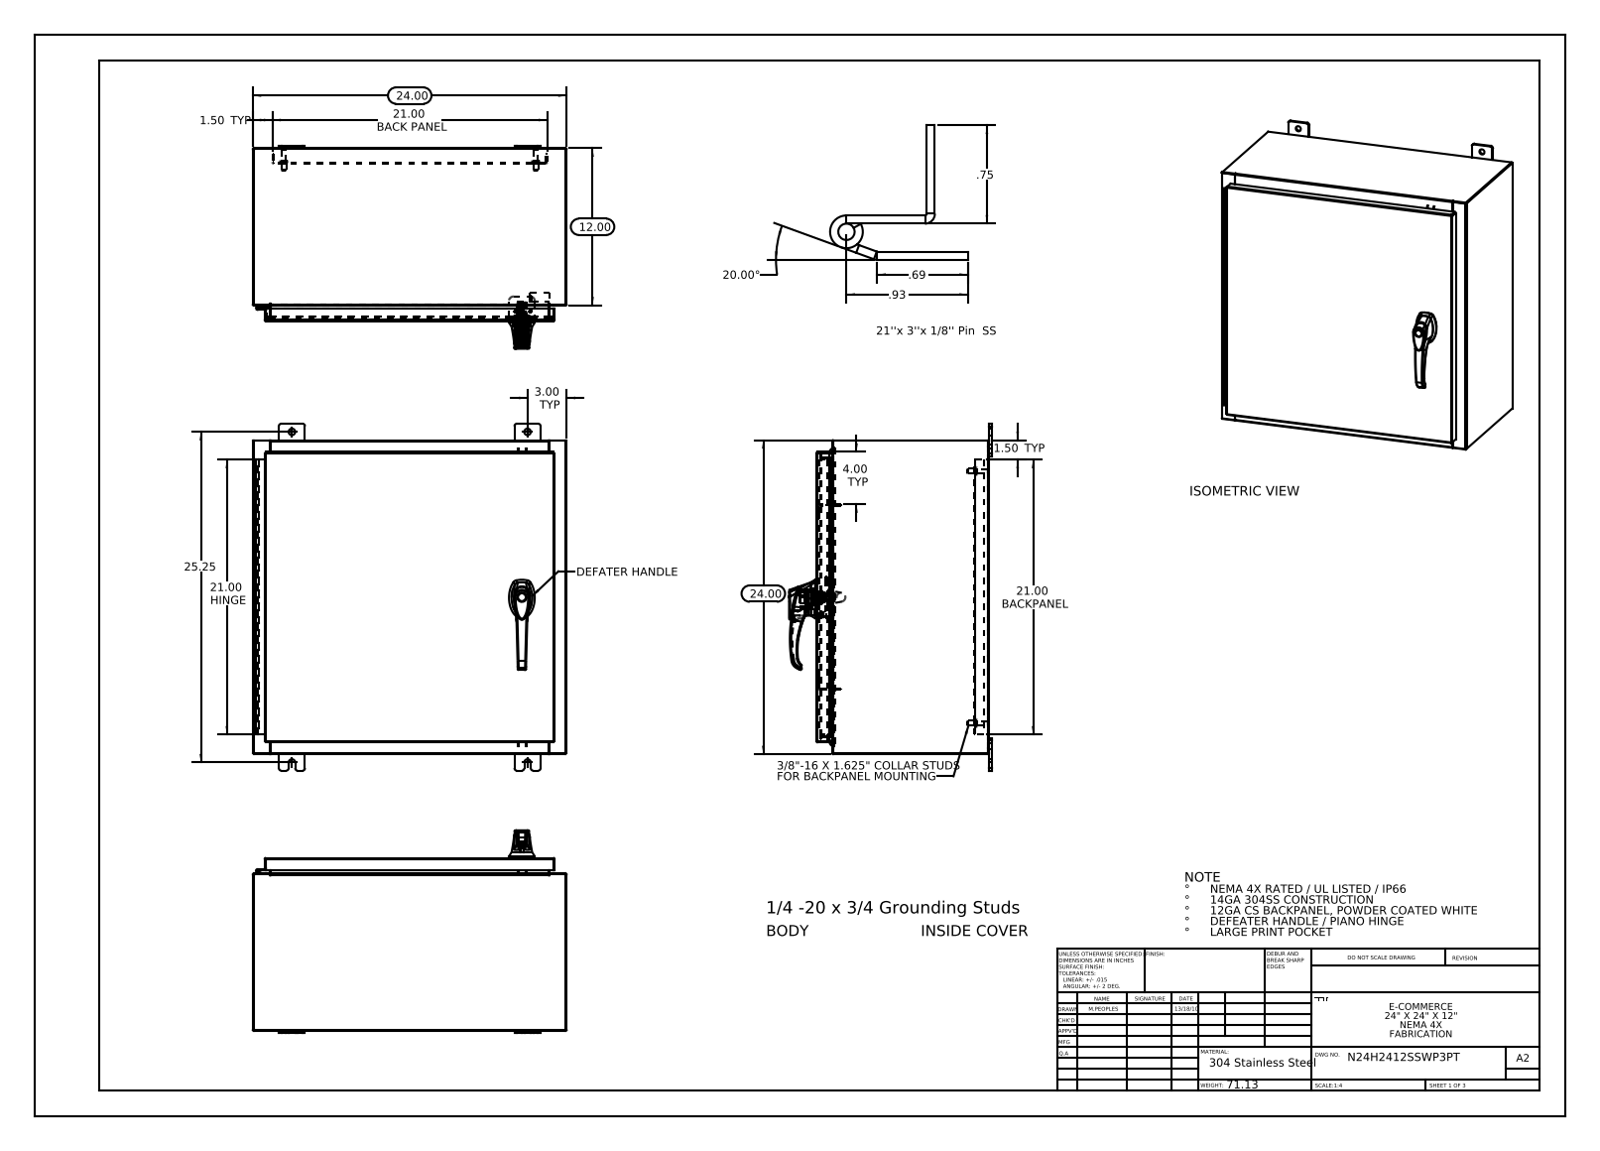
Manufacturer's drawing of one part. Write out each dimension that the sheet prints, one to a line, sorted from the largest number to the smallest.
25.25
24.00
24.00
21.00 HINGE
21.00 BACK PANEL
21.00 BACKPANEL
20.00°
12.00
4.00 TYP
3.00 TYP
1.50 TYP
1.50 TYP
.93
.75
.69
